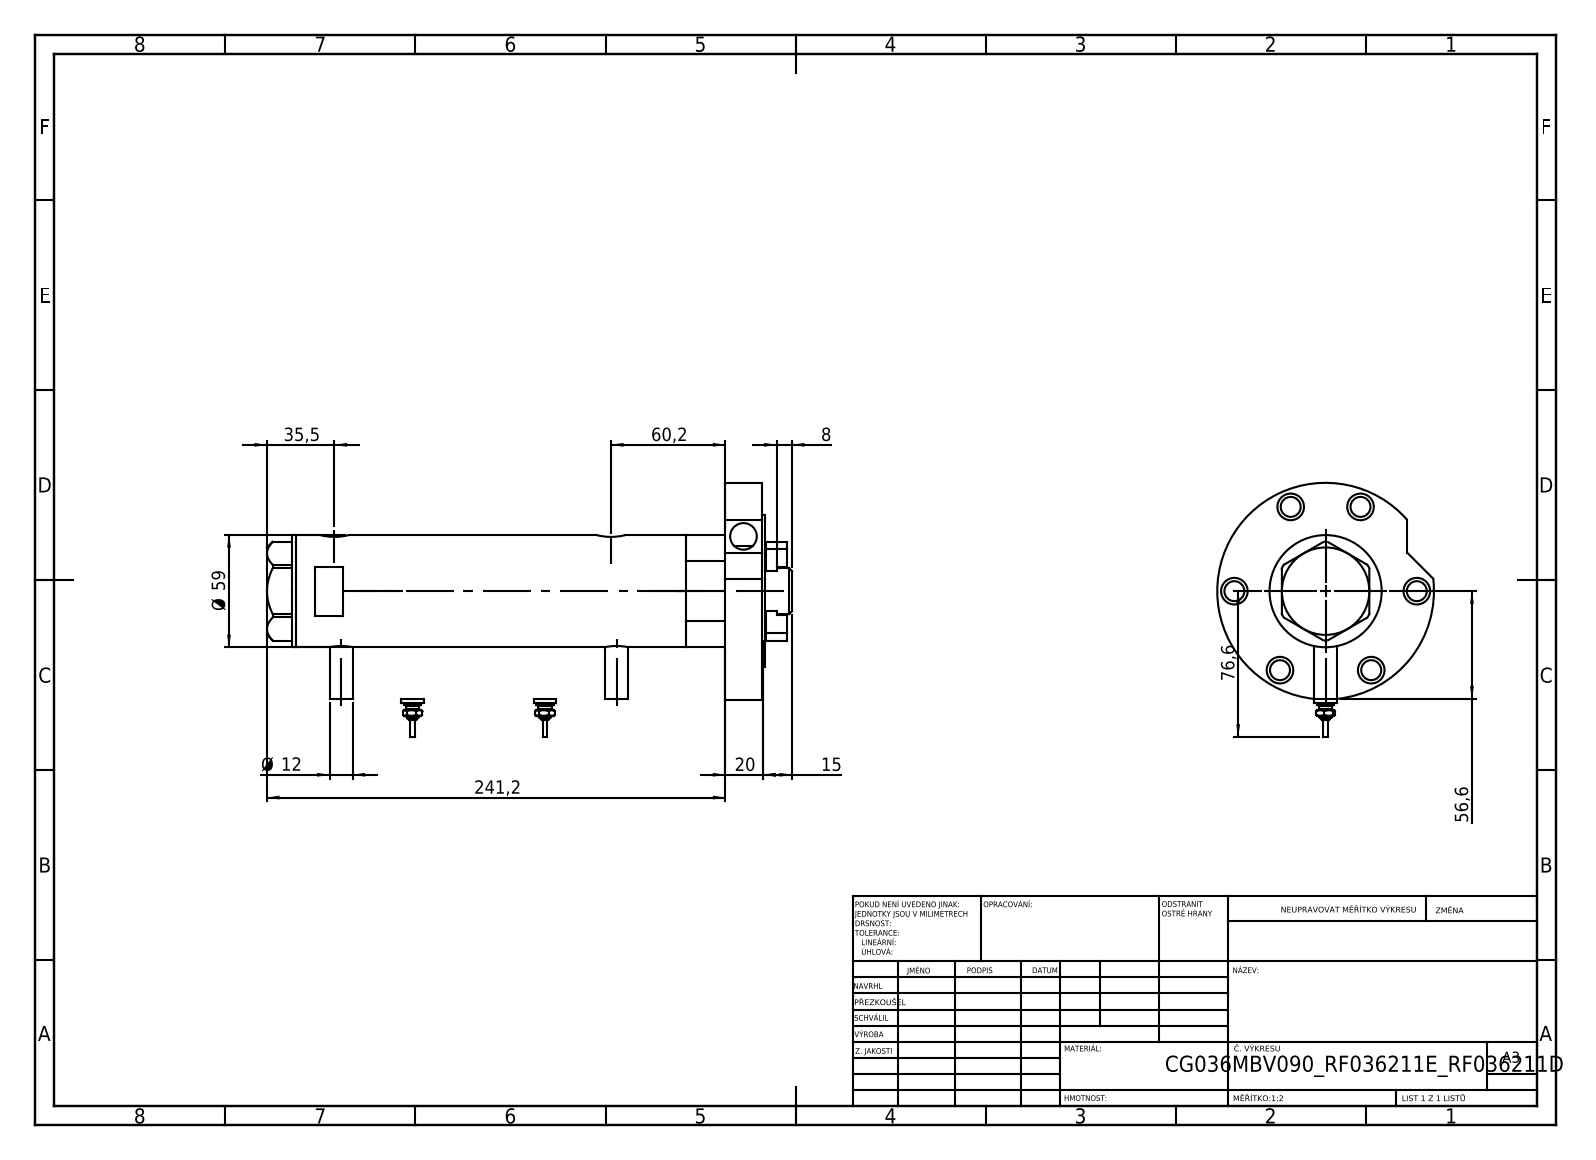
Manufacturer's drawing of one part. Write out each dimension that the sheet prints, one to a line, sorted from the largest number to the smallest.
241,2
76,6
60,2
Ø 59
56,6
35,5
20
15
Ø 12
8
